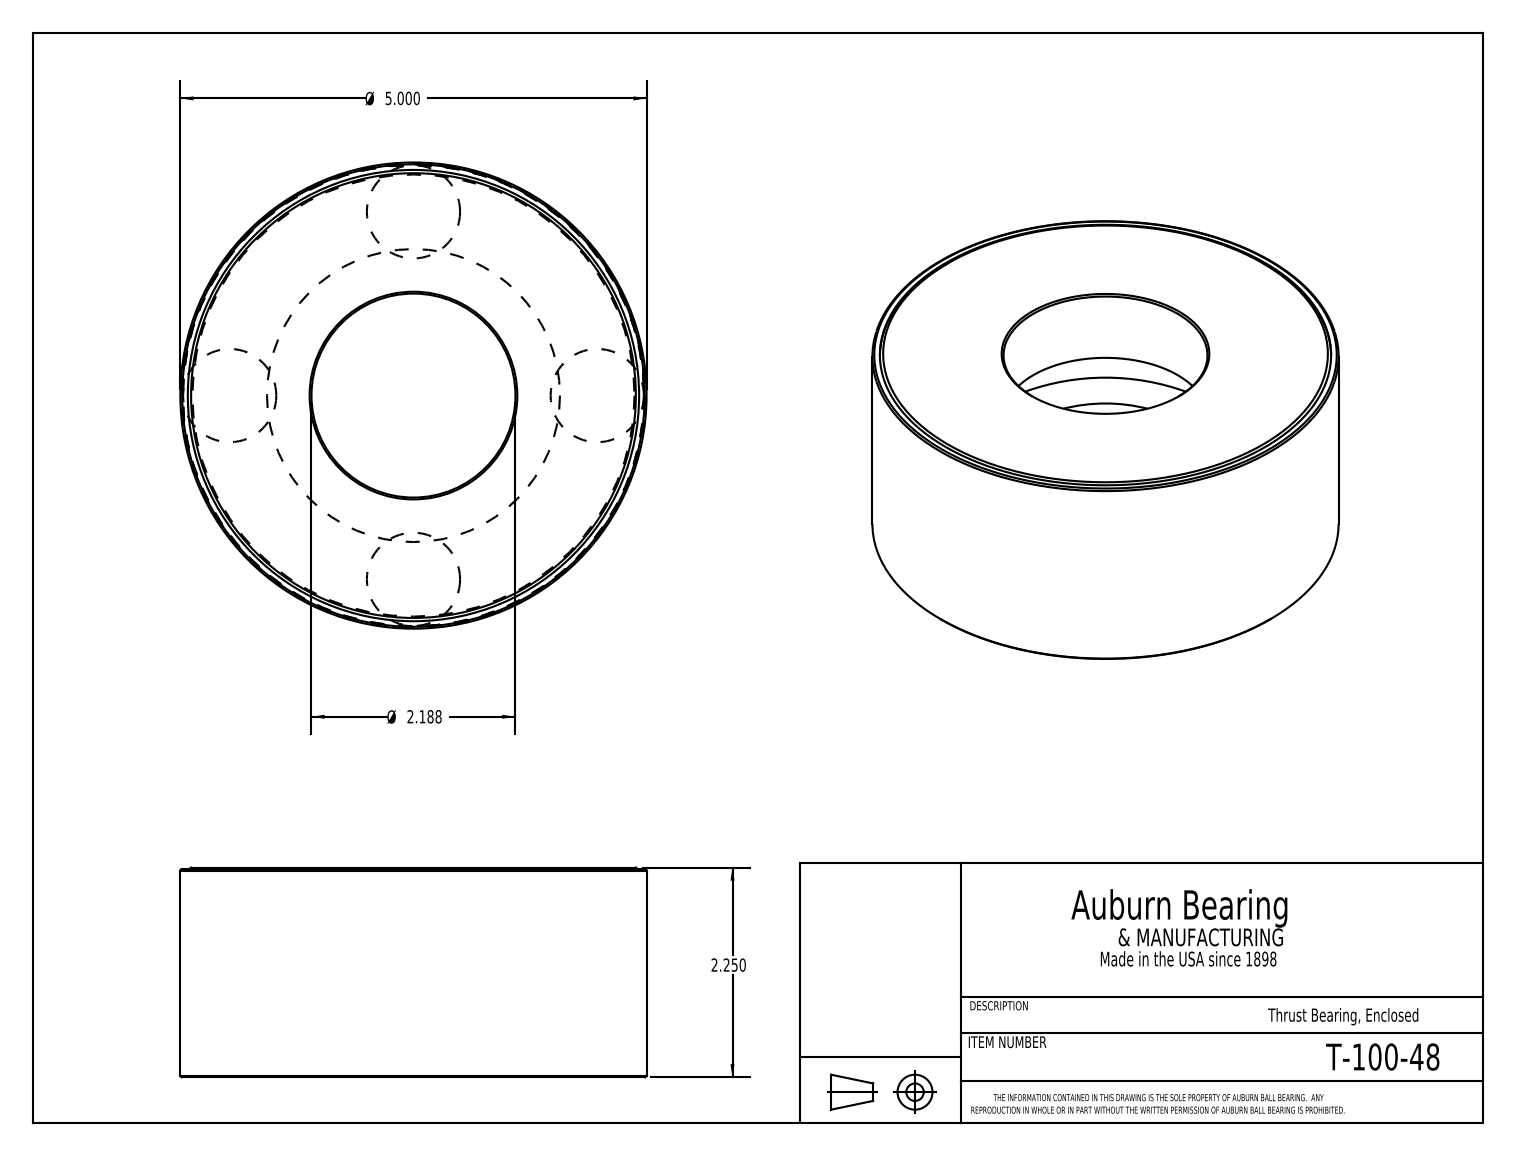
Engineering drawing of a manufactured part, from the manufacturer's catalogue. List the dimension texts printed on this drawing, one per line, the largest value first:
Ø 5.000
2.250
Ø 2.188
